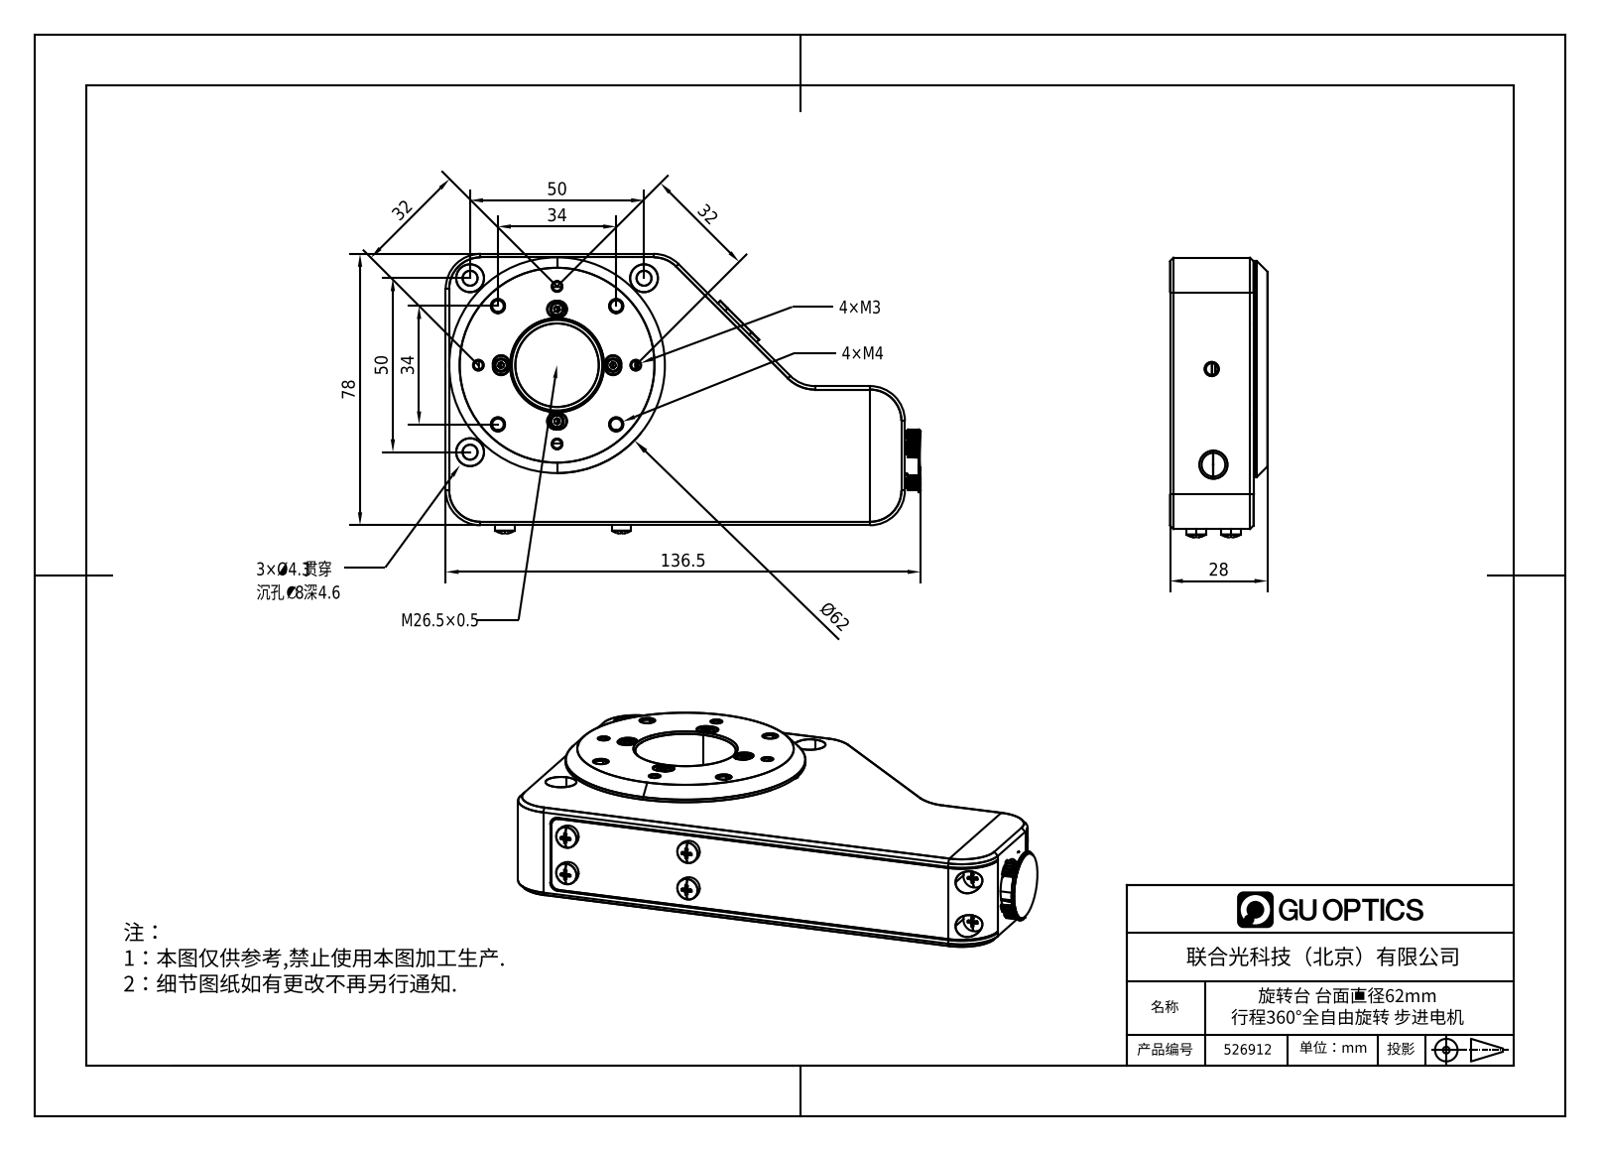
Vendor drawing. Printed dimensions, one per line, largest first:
136.5
78
Ø62
50
50
34
34
32
32
28
